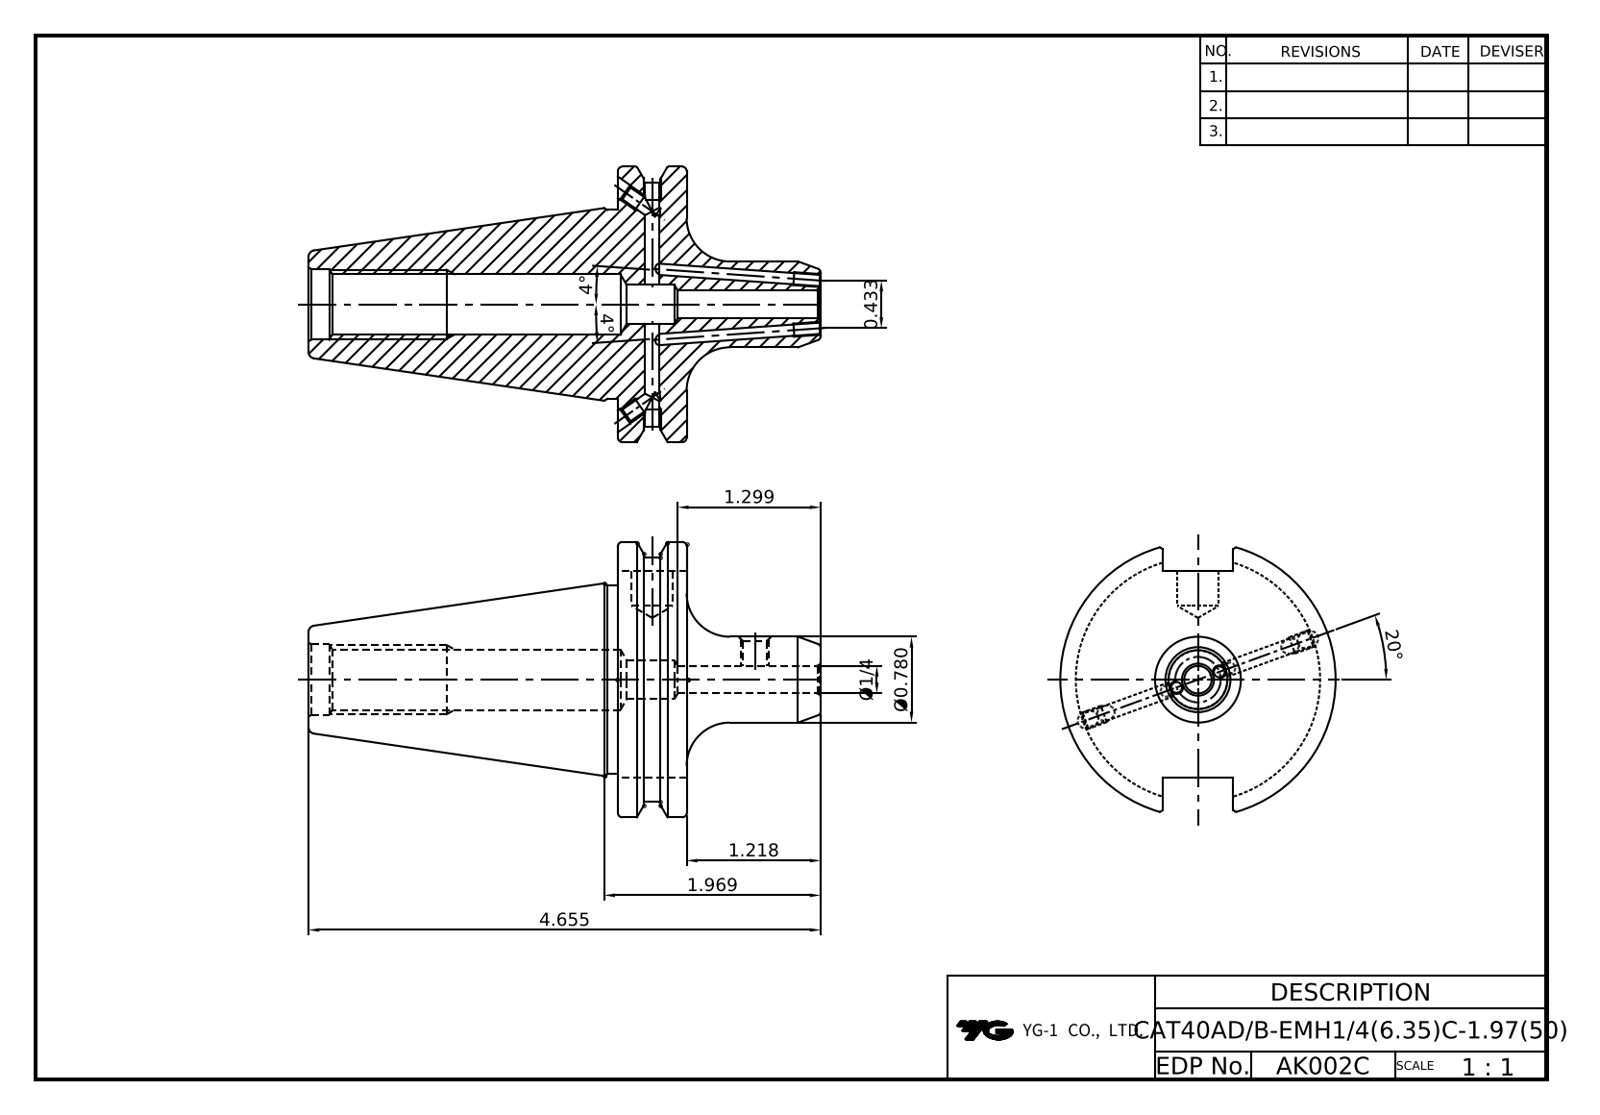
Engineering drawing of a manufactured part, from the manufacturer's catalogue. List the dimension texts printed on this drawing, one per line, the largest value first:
20°
4.655
4°
4°
1.969
1.299
1.218
Ø0.780
0.433
Ø1/4
